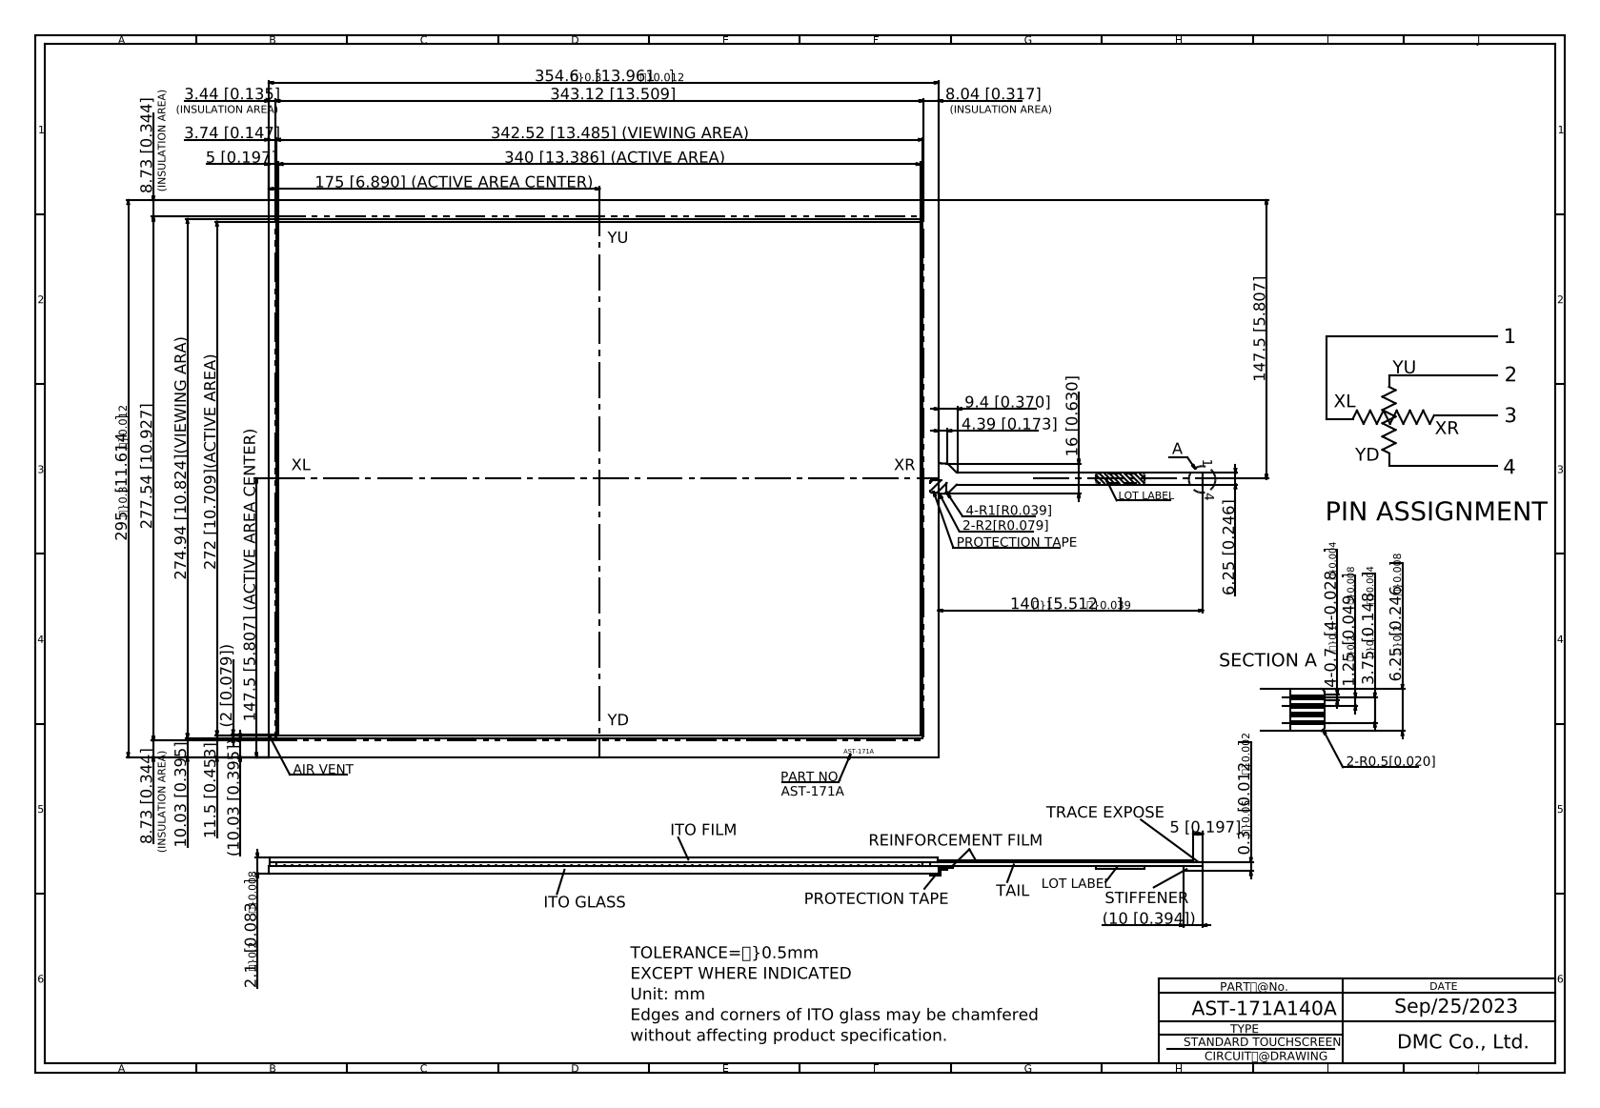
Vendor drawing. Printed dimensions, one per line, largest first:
354.60
343.12 [13.509]
342.52 [13.485] (VIEWING AREA)
340 [13.386] (ACTIVE AREA)
295.00
277.54 [10.927]
274.94 [10.824](VIEWING ARA)
272 [10.709](ACTIVE AREA)
175 [6.890] (ACTIVE AREA CENTER)
147.5 [5.807]
147.5 [5.807] (ACTIVE AREA CENTER)
140.00
16 [0.630]
11.5 [0.453]
10.03 [0.395]
(10.03 [0.395])
(10 [0.394])
9.4 [0.370]
8.73 [0.344]
8.73 [0.344]
8.04 [0.317]
6.25{\H0.6667x;?}0.2}[0.246{\H0.6667x;?}0.008}]
6.25 [0.246]
5 [0.197]
5 [0.197]
4.39 [0.173]
4-0.7{\H0.6x;?}0.1}[4-0.028{\H0.6x;?}0.004}]
3.75{\H0.6x;?}0.1}[0.148{\H0.6x;?}0.004}]
3.74 [0.147]
3.44 [0.135]
2.1{\H0.6667x;?}0.2}[0.083{\H0.6667x;?}0.008}]
(2 [0.079])
1.25{\H0.6x;?}0.2}[0.049{\H0.6x;?}0.008}]
0.3{\H0.6667x;?}0.05}[0.012{\H0.6667x;?}0.002}]
